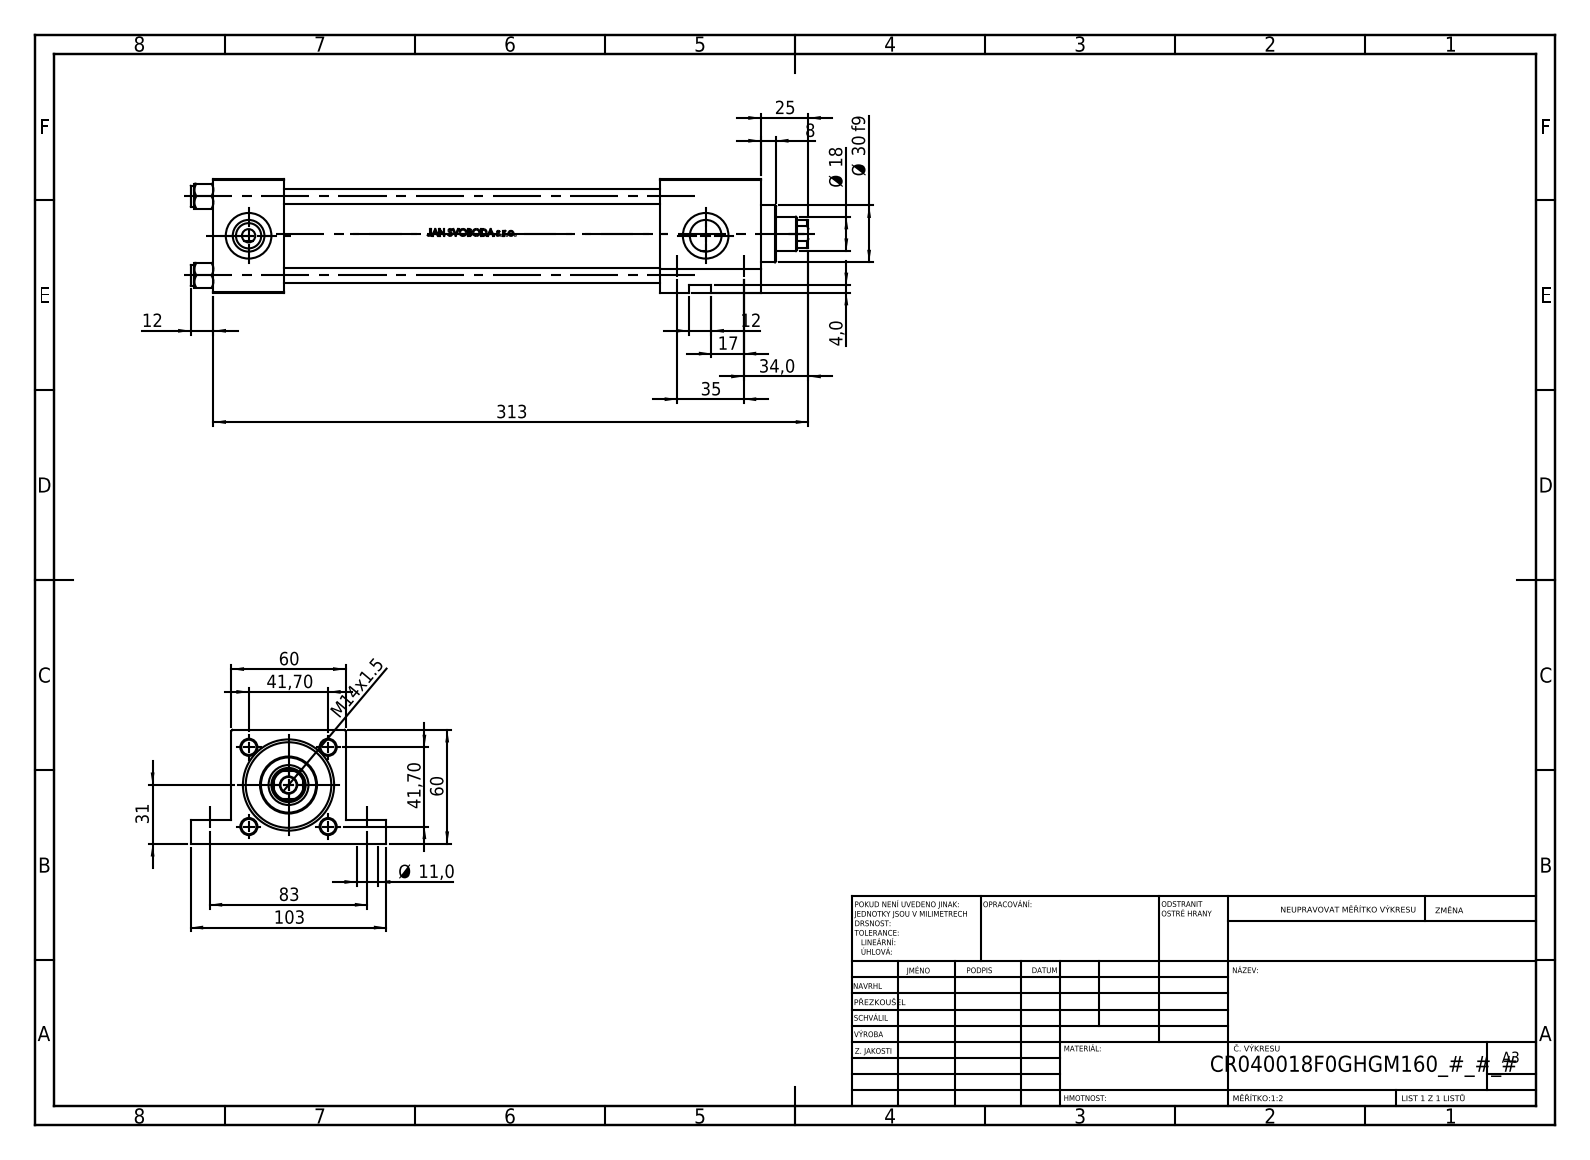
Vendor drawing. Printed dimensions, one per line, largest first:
313
103
83
60
60
41,70
41,70
35
34,0
31
Ø 30 f9
25
Ø 18
17
M14x1.5
12
12
Ø 11,0
8
4,0
